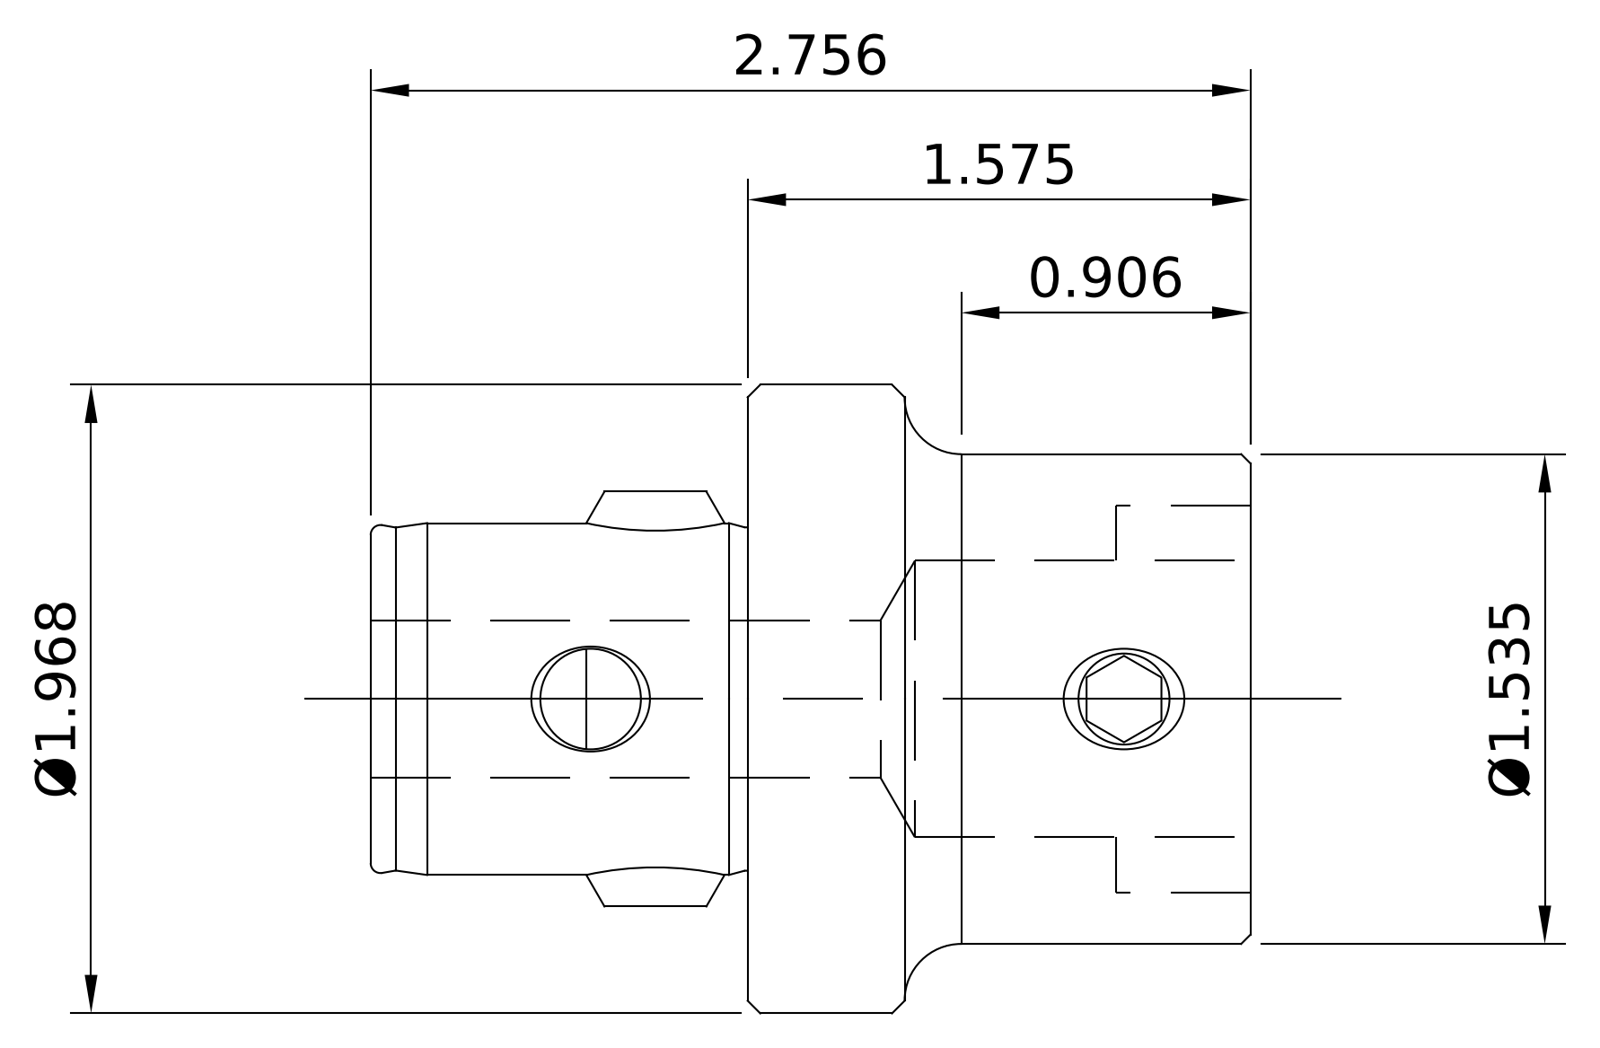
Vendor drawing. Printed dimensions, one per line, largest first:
2.756
Ø1.968
1.575
Ø1.535
0.906
